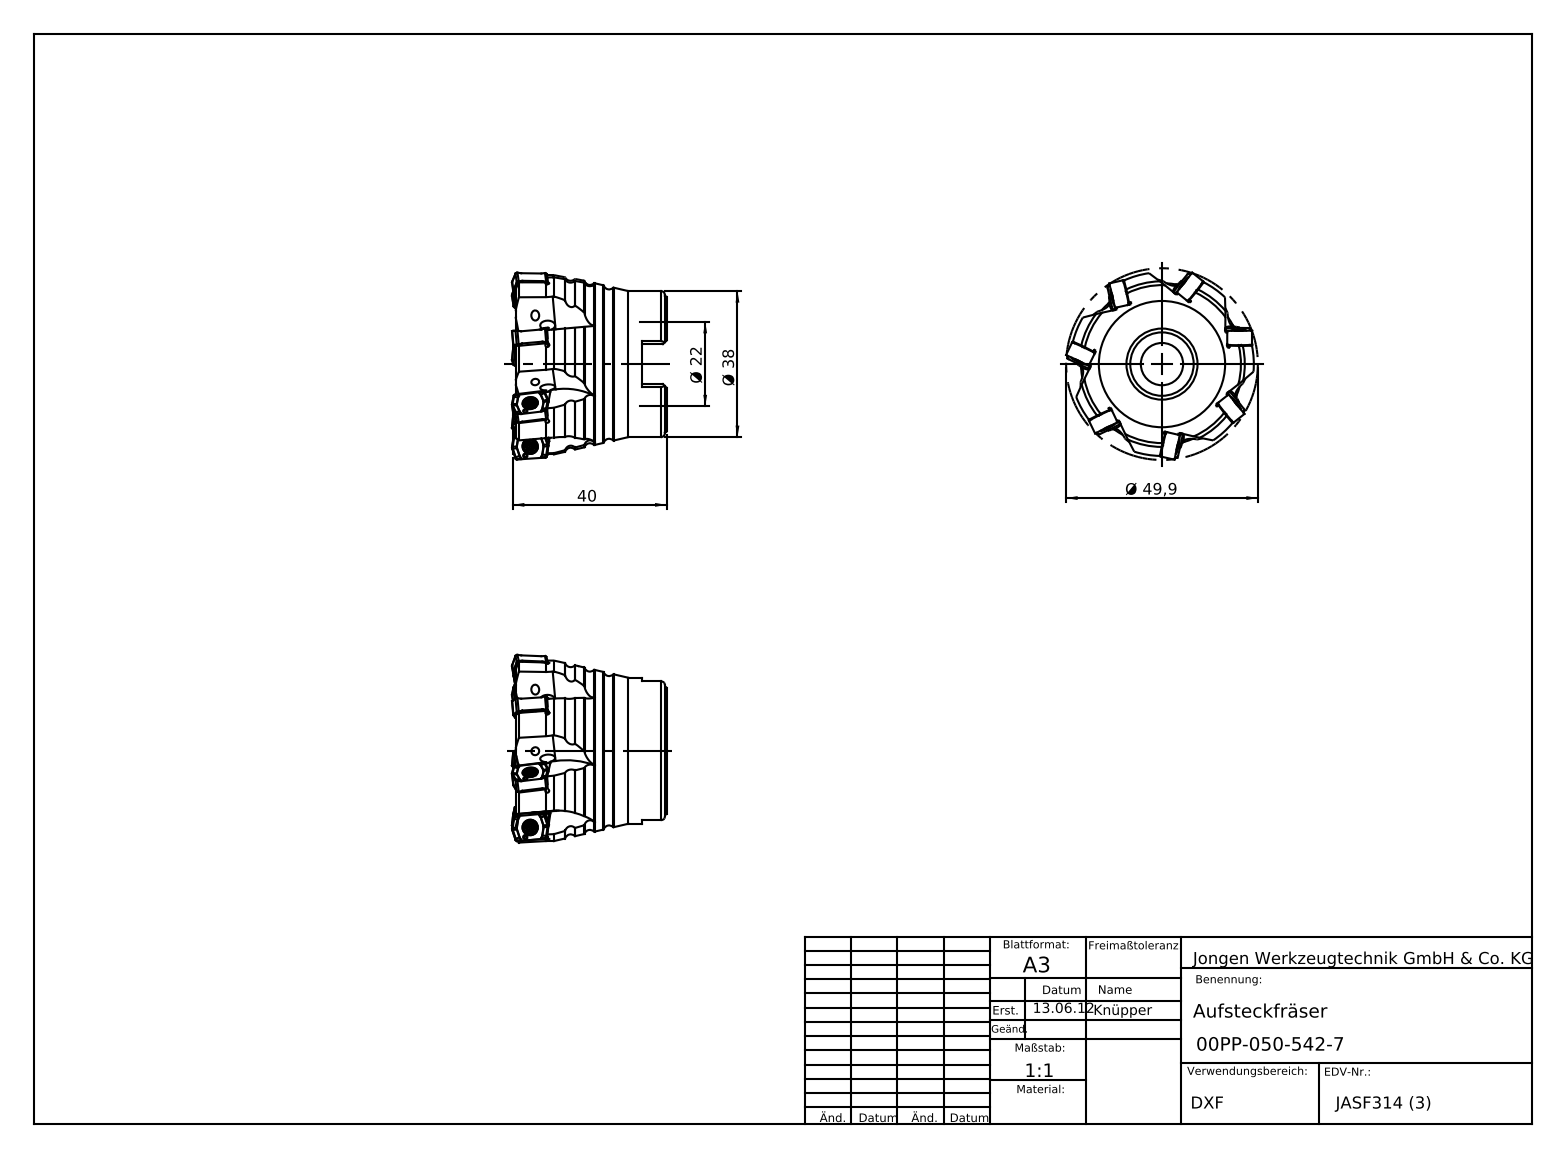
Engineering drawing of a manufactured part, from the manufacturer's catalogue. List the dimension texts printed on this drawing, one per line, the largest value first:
Ø 49,9
40
Ø 38
Ø 22
